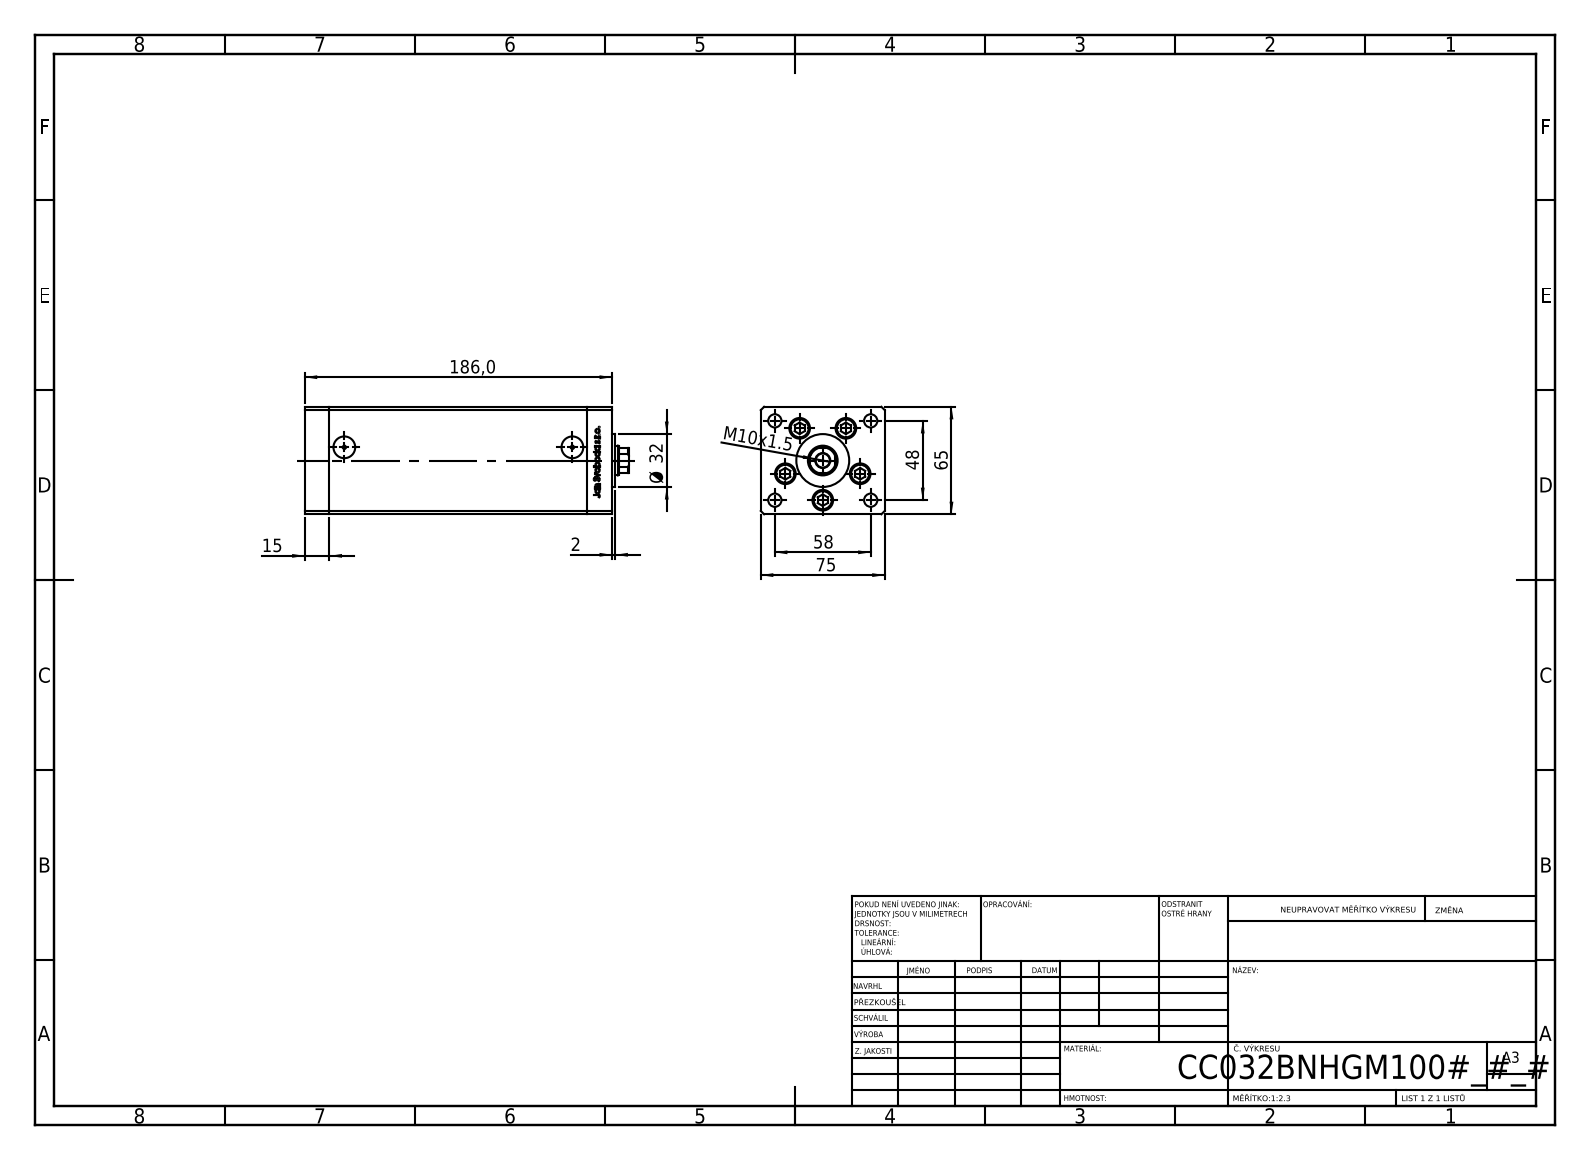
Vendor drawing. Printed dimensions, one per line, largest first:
186,0
75
65
58
48
Ø 32
15
M10x1.5
2
